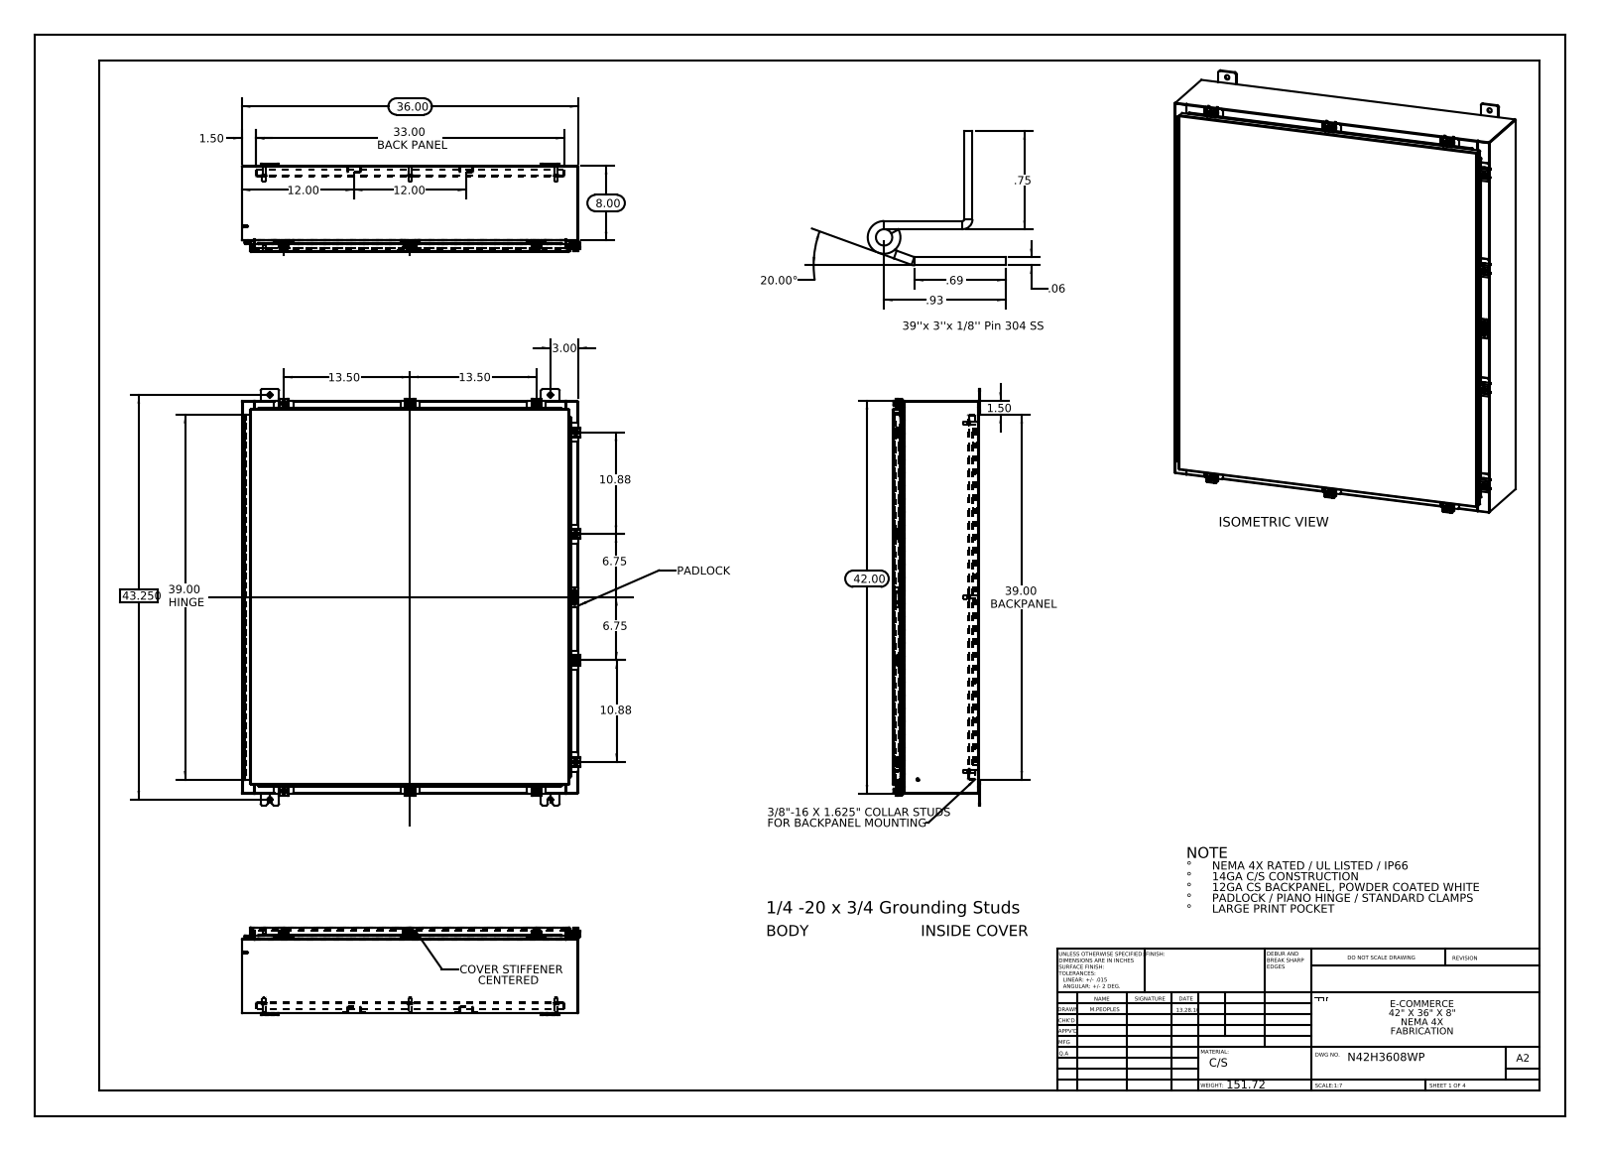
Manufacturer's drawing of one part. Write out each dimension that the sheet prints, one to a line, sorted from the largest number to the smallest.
43.250
42.00
39.00 HINGE
39.00 BACKPANEL
36.00
33.00 BACK PANEL
20.00°
13.50
13.50
12.00
12.00
10.88
10.88
8.00
6.75
6.75
3.00
1.50
1.50
.93
.75
.69
.06
